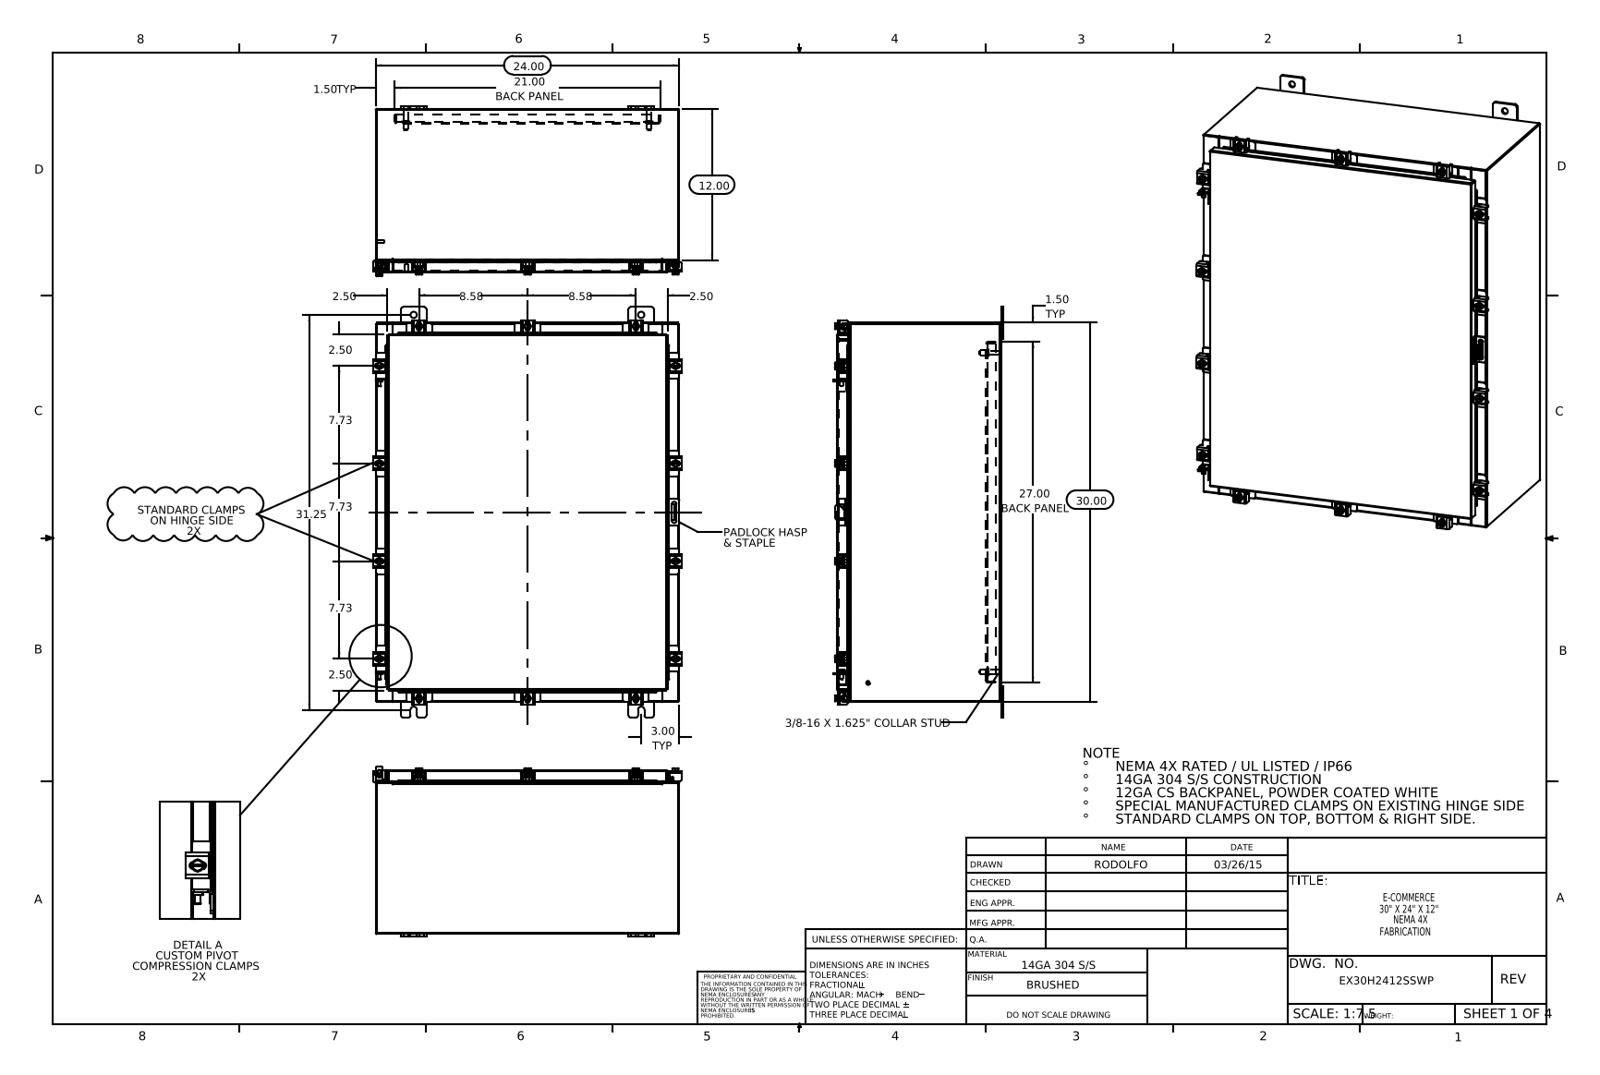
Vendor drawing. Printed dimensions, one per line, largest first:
31.25
30.00
27.00 BACK PANEL
24.00
21.00 BACK PANEL
12.00
8.58
8.58
7.73
7.73
7.73
3.00 TYP
2.50
2.50
2.50
2.50
1.50 TYP
1.50 TYP
